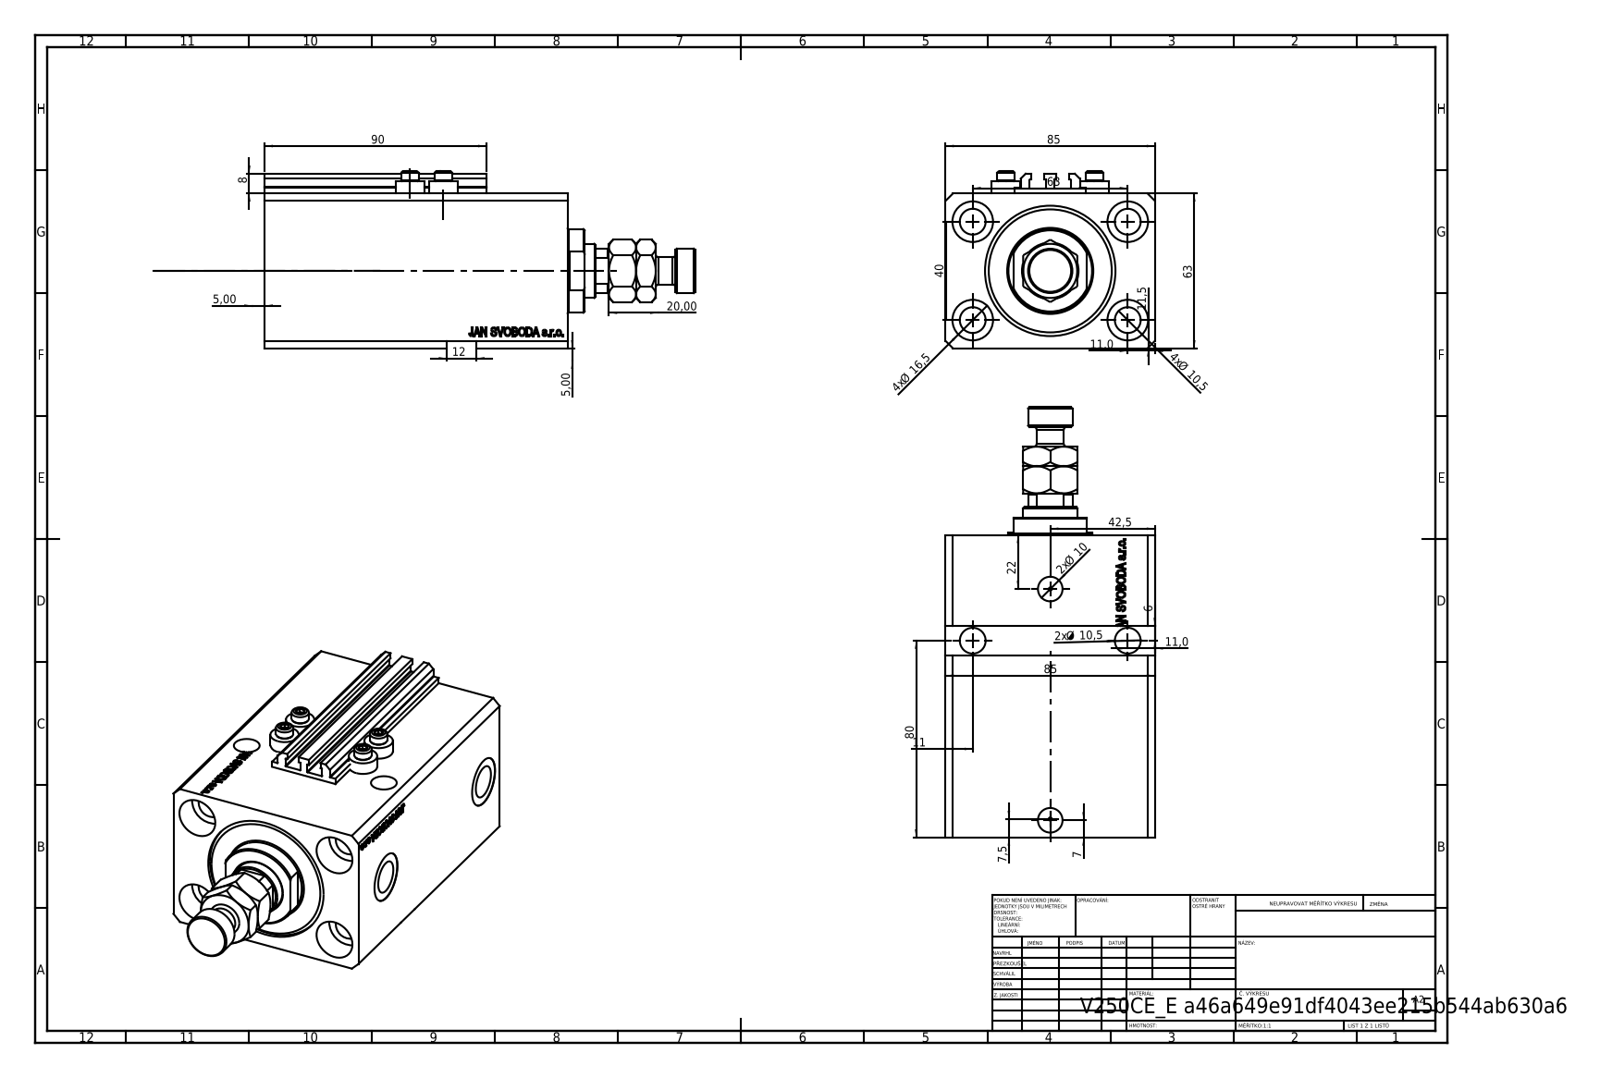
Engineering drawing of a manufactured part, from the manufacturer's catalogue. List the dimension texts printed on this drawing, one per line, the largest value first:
90
85
85
80
63
63
42,5
40
22
20,00
4x Ø 16,5
12
11,5
11,0
11,0
11
4x Ø 10,5
2x Ø 10,5
2x Ø 10
8
7,5
7
6
5,00
5,00
